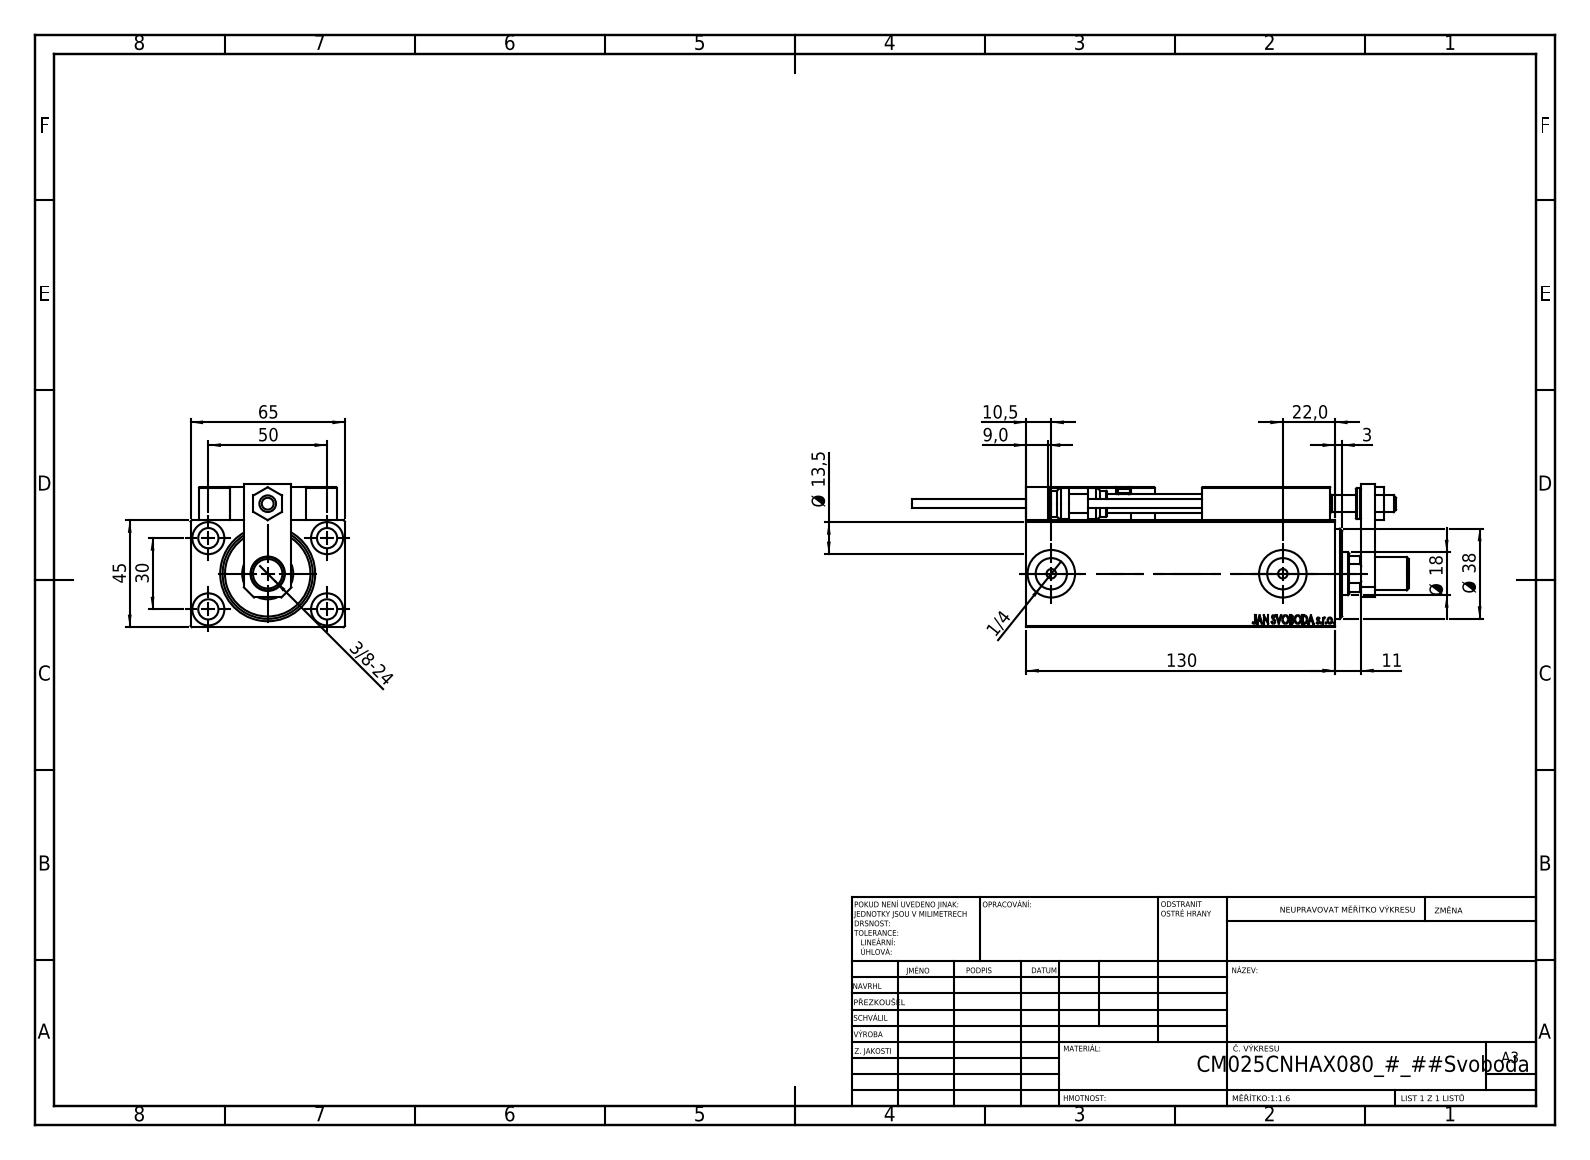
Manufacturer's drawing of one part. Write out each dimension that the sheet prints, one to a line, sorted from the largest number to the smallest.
130
65
50
45
Ø 38
30
22,0
Ø 18
Ø 13,5
11
10,5
9,0
3
3/8-24
1/4
